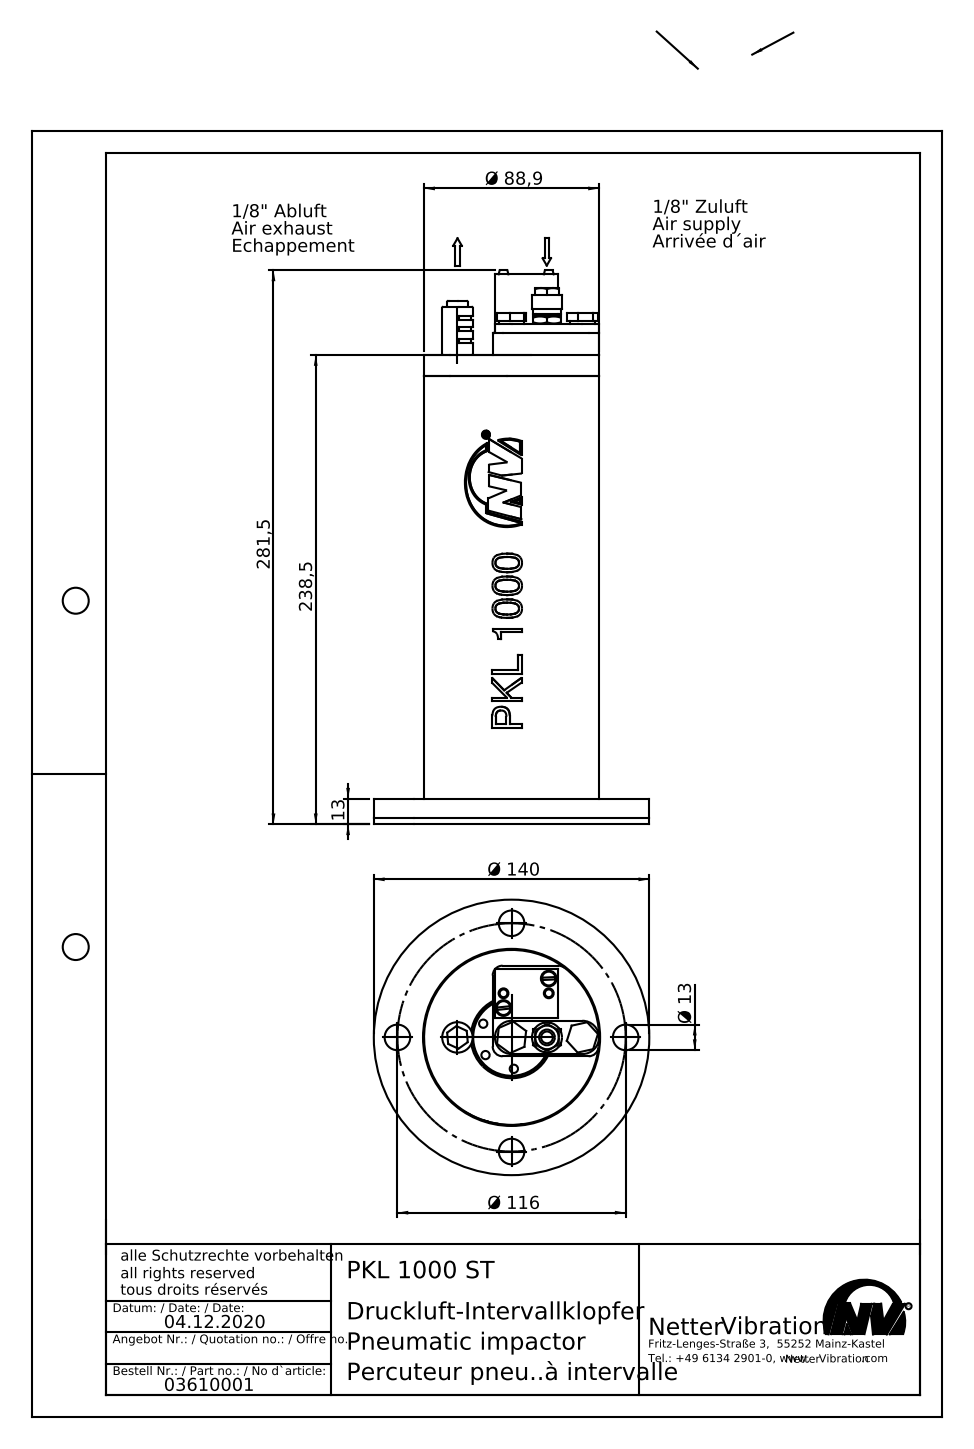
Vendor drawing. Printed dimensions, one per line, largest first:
281,5
238,5
Ø 140
Ø 116
Ø 88,9
13
Ø 13
